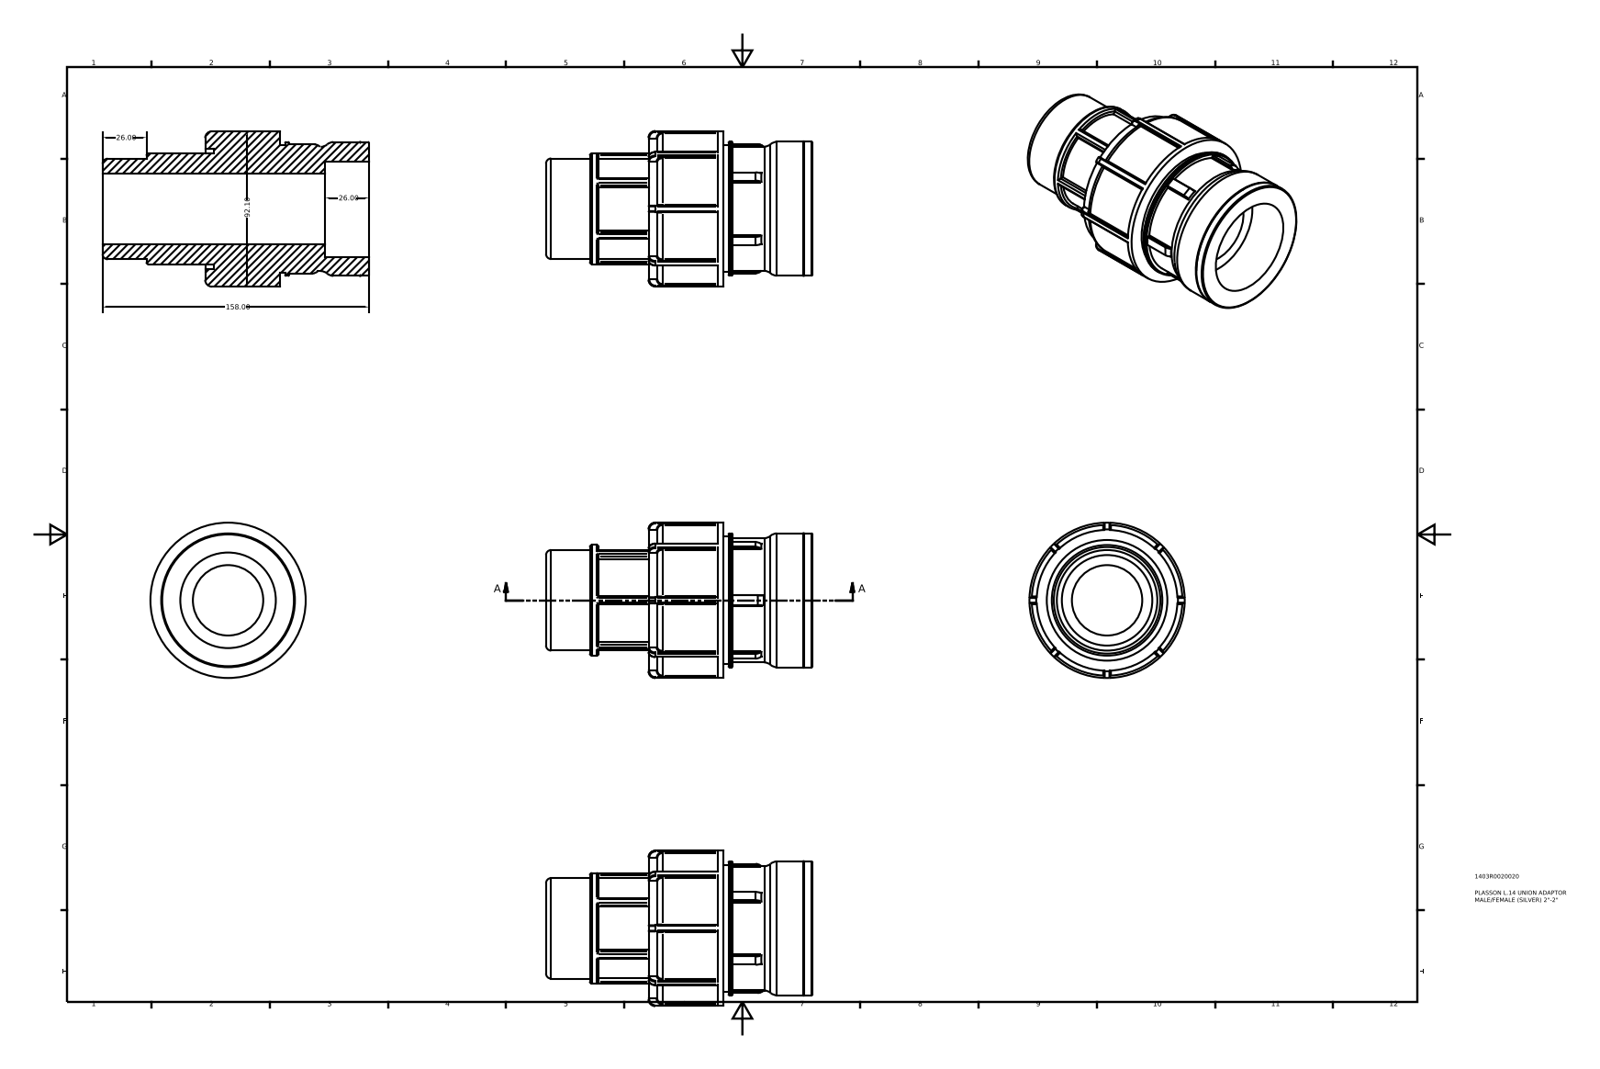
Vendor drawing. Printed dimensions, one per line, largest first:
158.00
92.10
26.00
26.00
